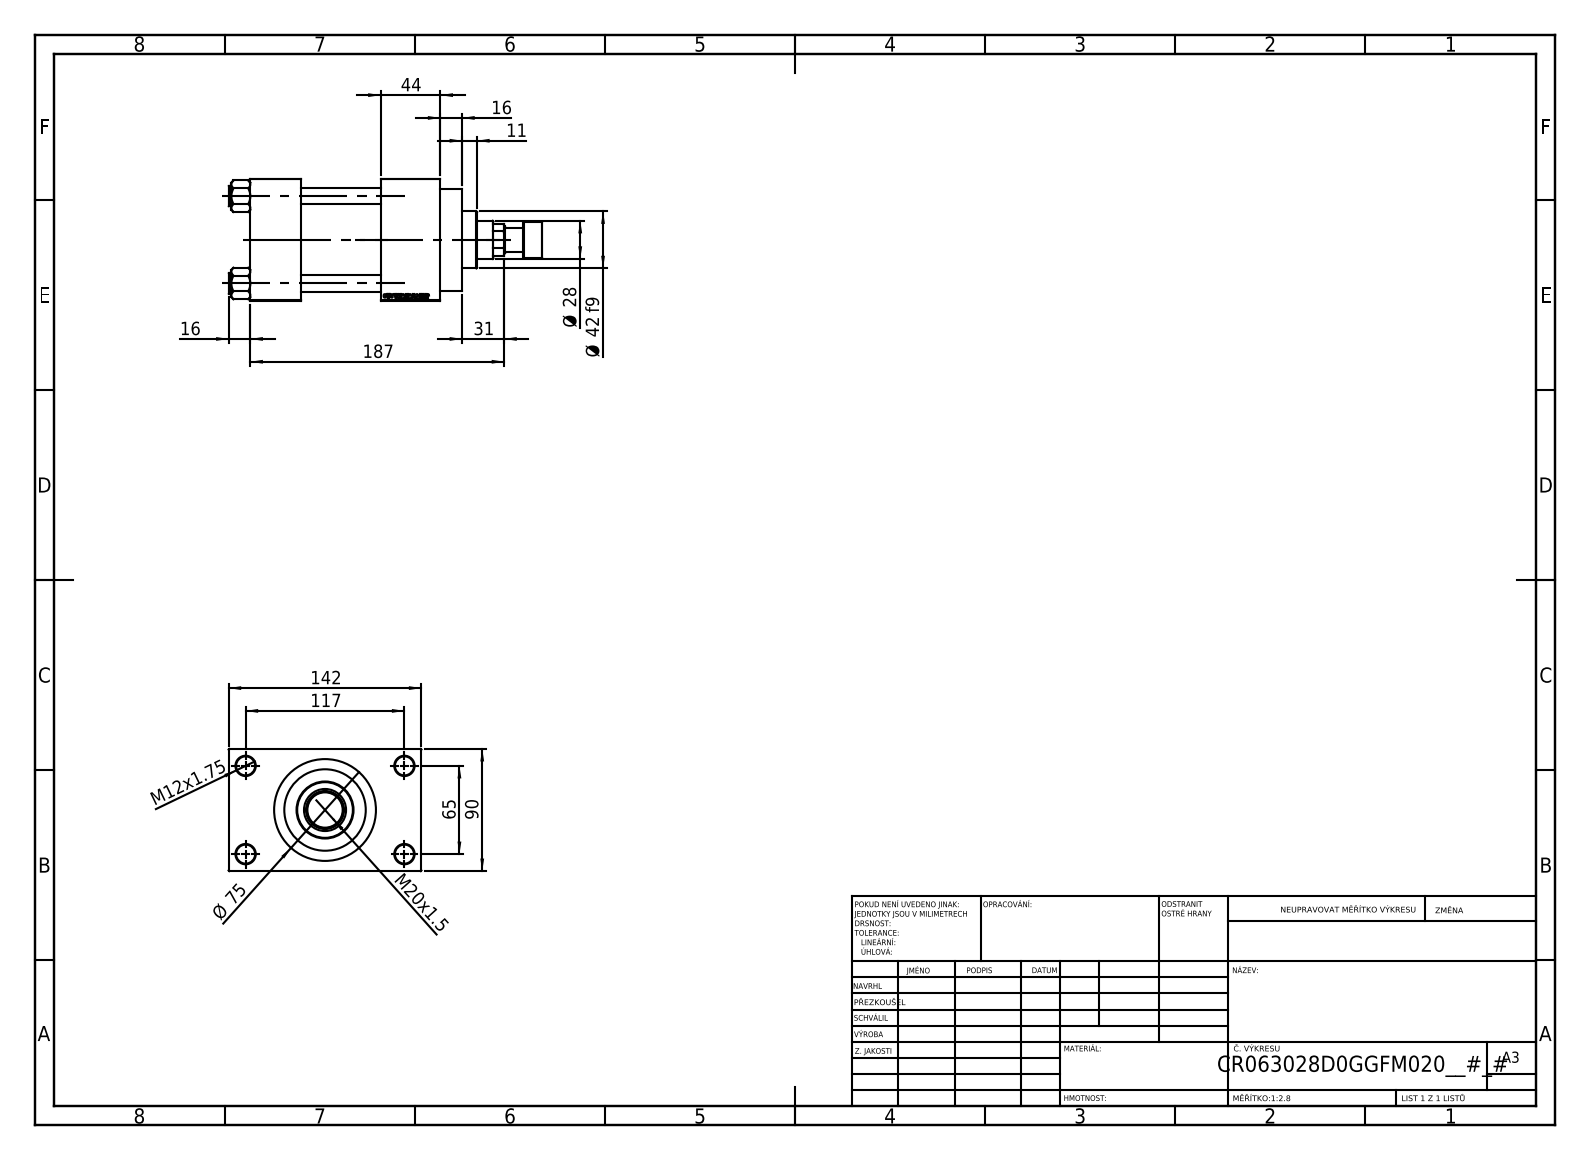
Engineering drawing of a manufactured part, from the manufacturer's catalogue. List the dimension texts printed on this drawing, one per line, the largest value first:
187
142
117
90
Ø 75
65
44
Ø 42 f9
31
Ø 28
M20x1.5
16
16
M12x1.75
11
